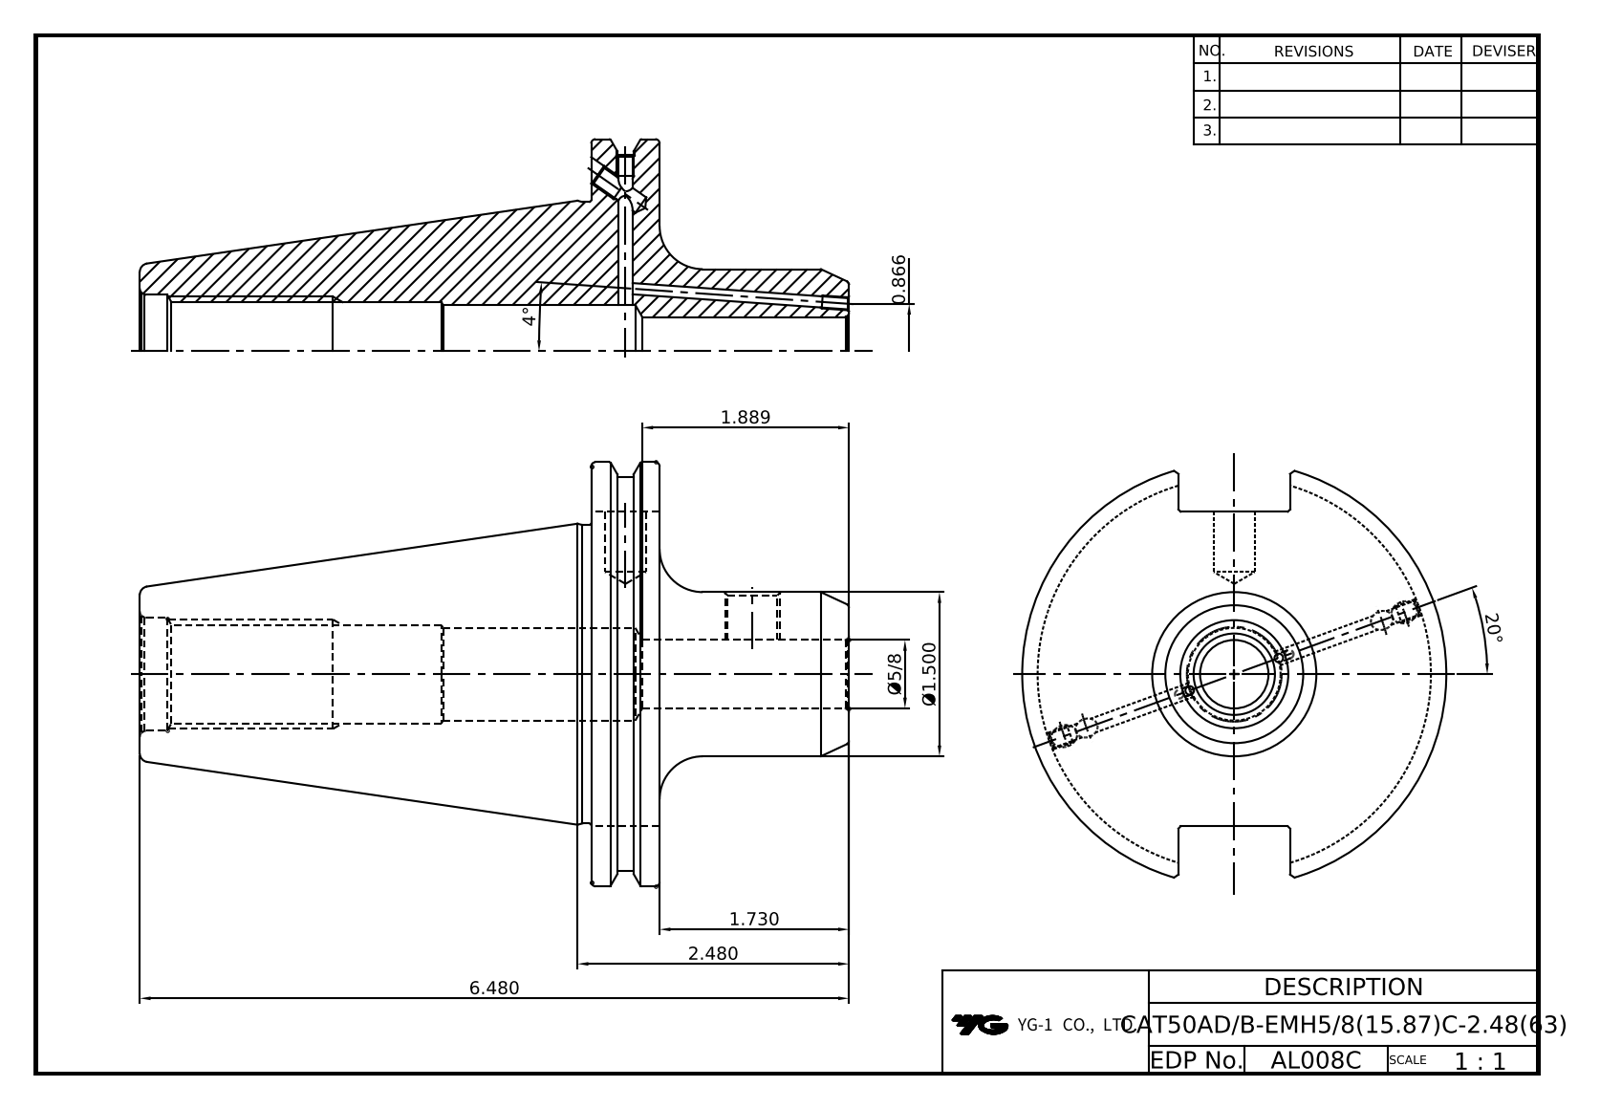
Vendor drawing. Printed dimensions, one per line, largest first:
20°
6.480
4°
2.480
1.889
1.730
Ø1.500
Ø5/8
